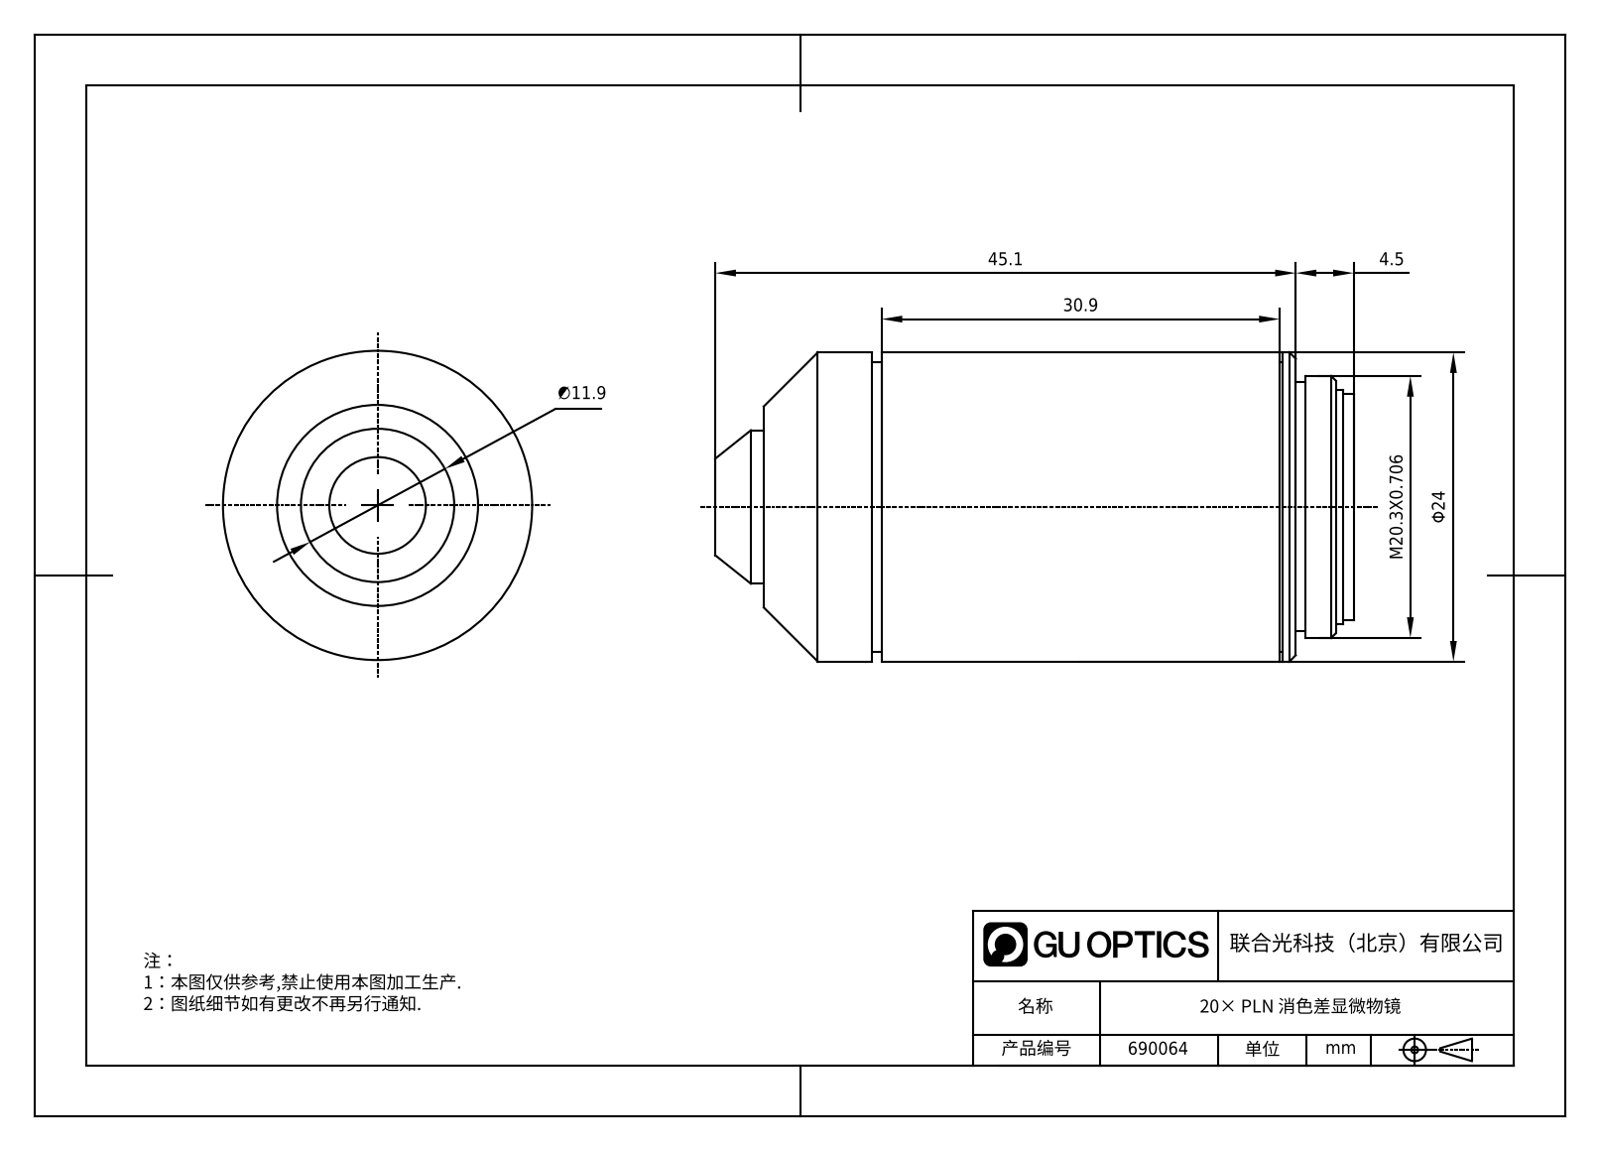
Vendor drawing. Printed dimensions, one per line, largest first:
45.1
30.9
Φ24
M20.3X0.706
∅11.9
4.5
